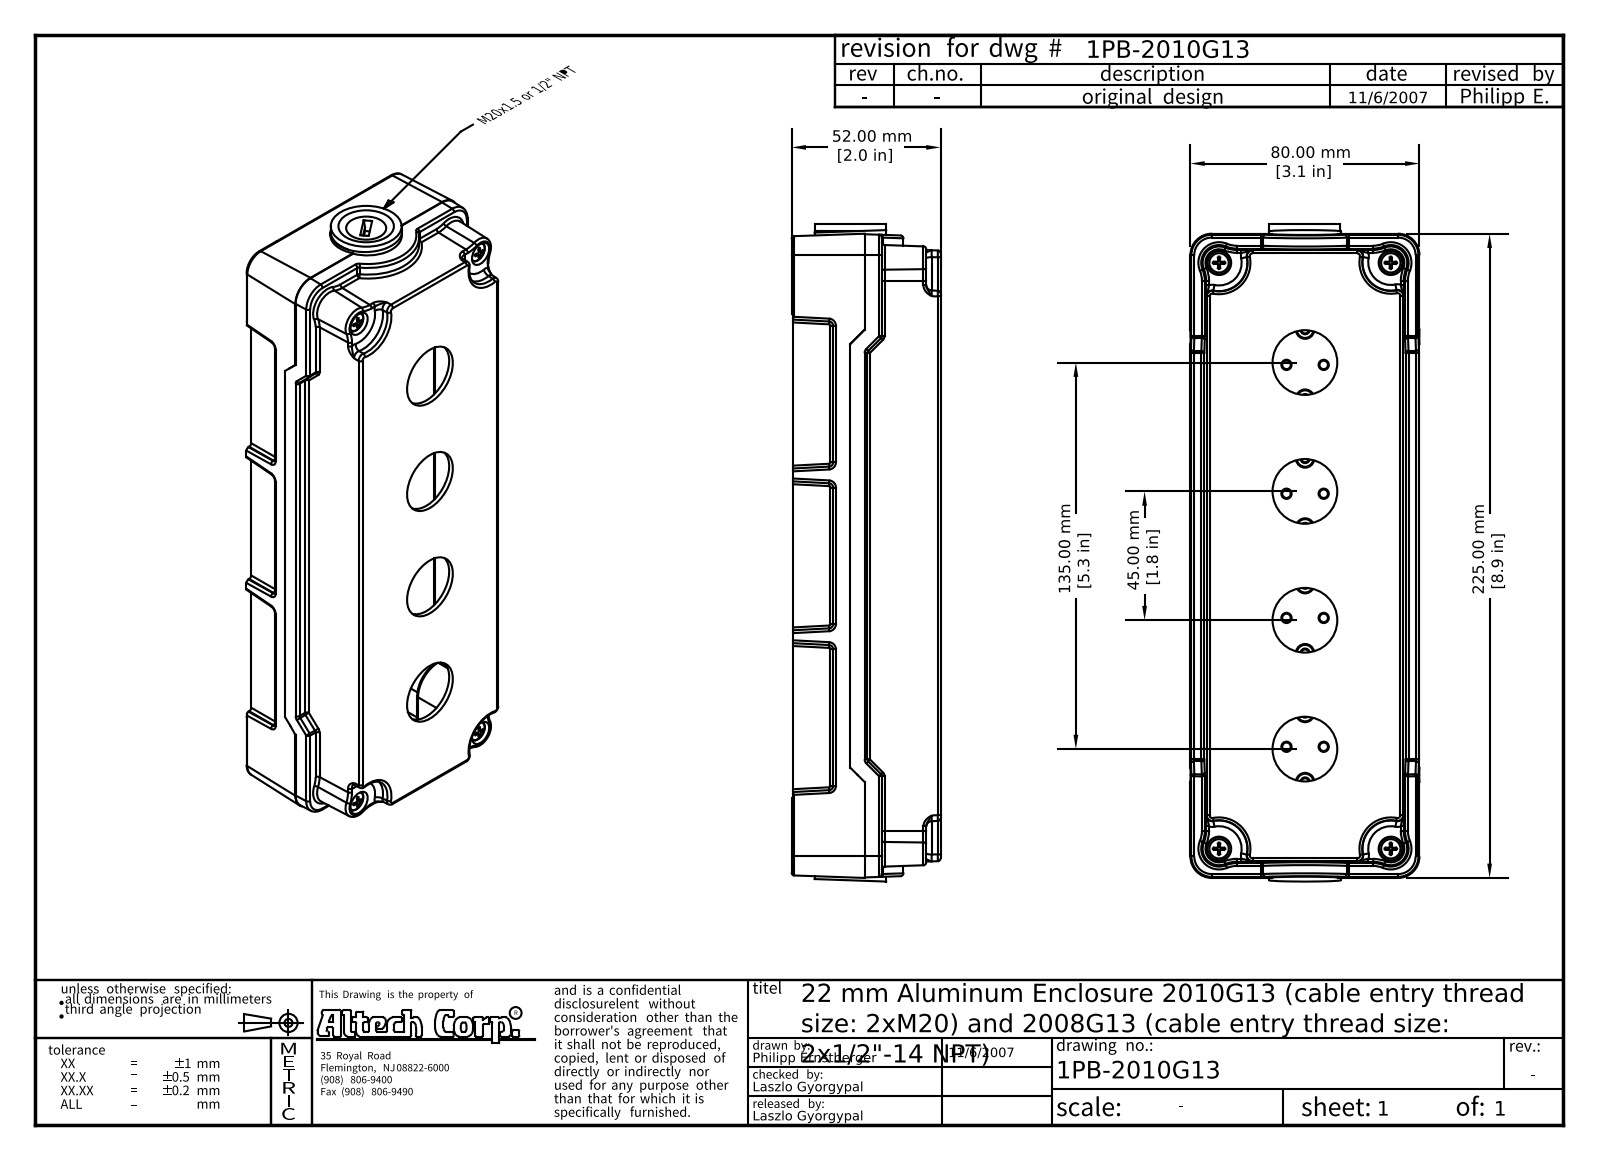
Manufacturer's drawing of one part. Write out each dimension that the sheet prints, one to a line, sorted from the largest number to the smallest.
225.00 mm [8.9 in]
135.00 mm [5.3 in]
80.00 mm [3.1 in]
52.00 mm [2.0 in]
45.00 mm [1.8 in]
